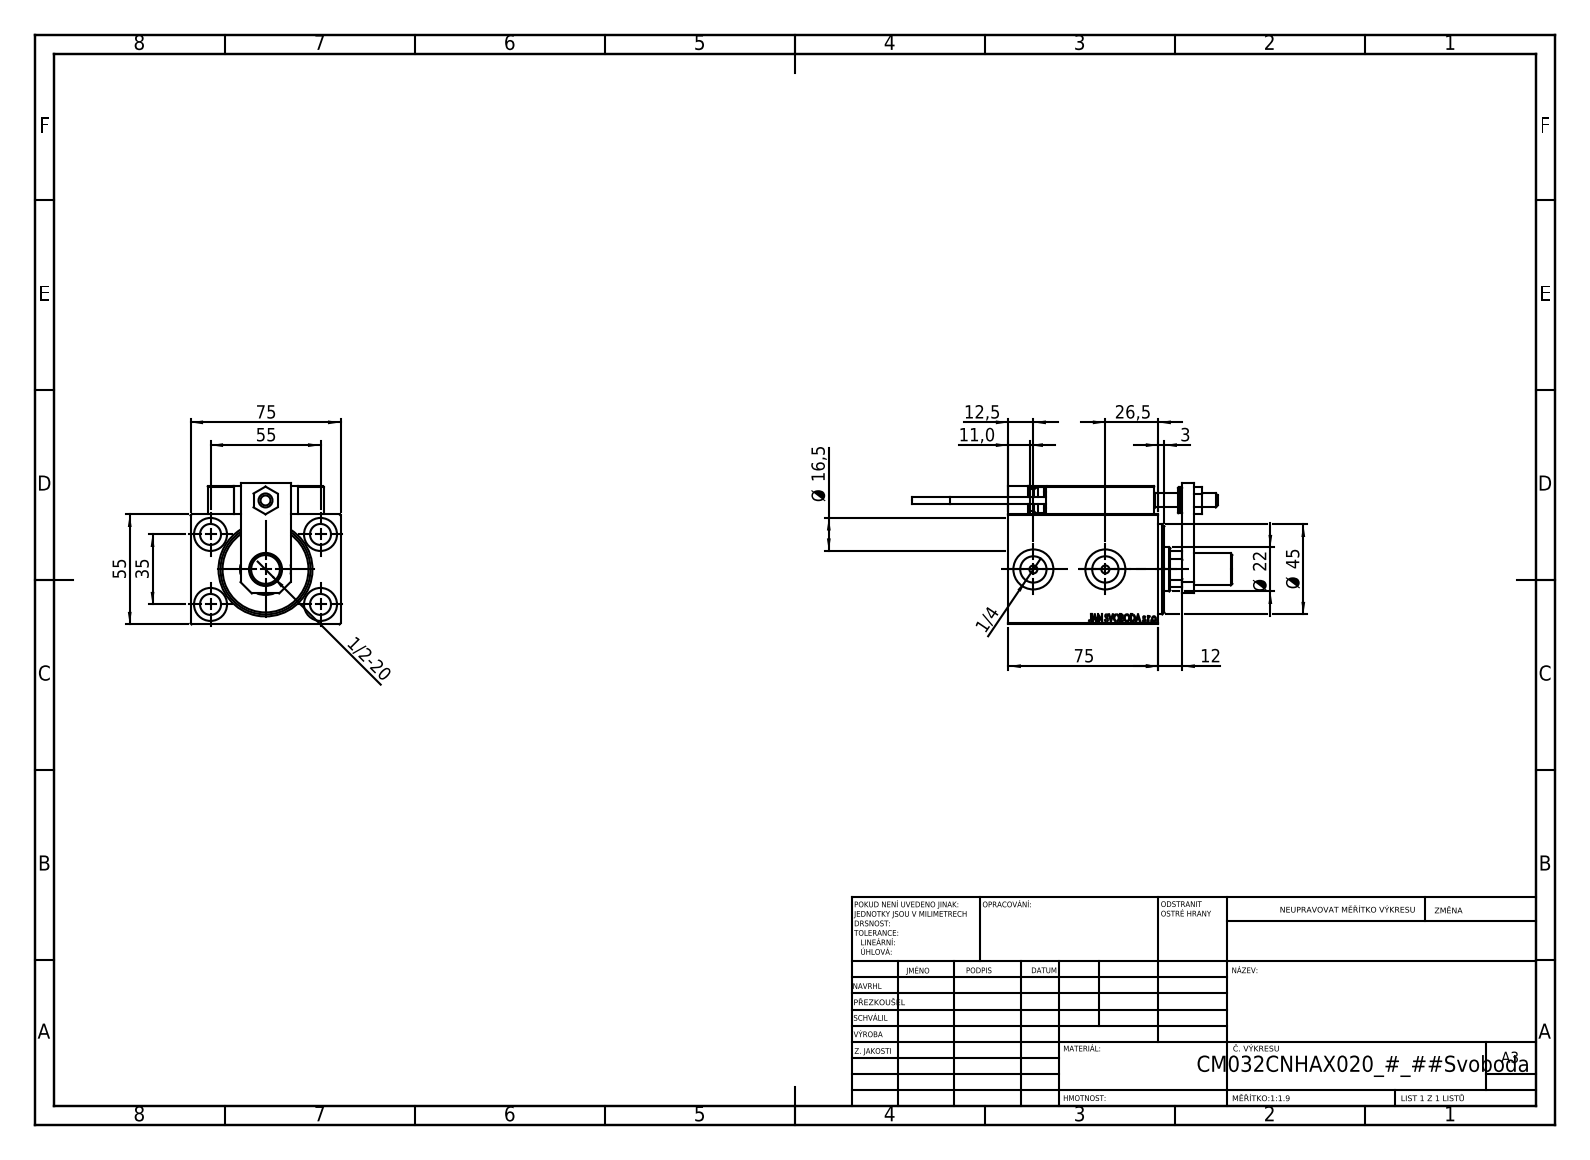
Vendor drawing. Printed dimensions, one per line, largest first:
75
75
55
55
Ø 45
35
26,5
Ø 22
Ø 16,5
12,5
12
11,0
3
1/2-20
1/4
